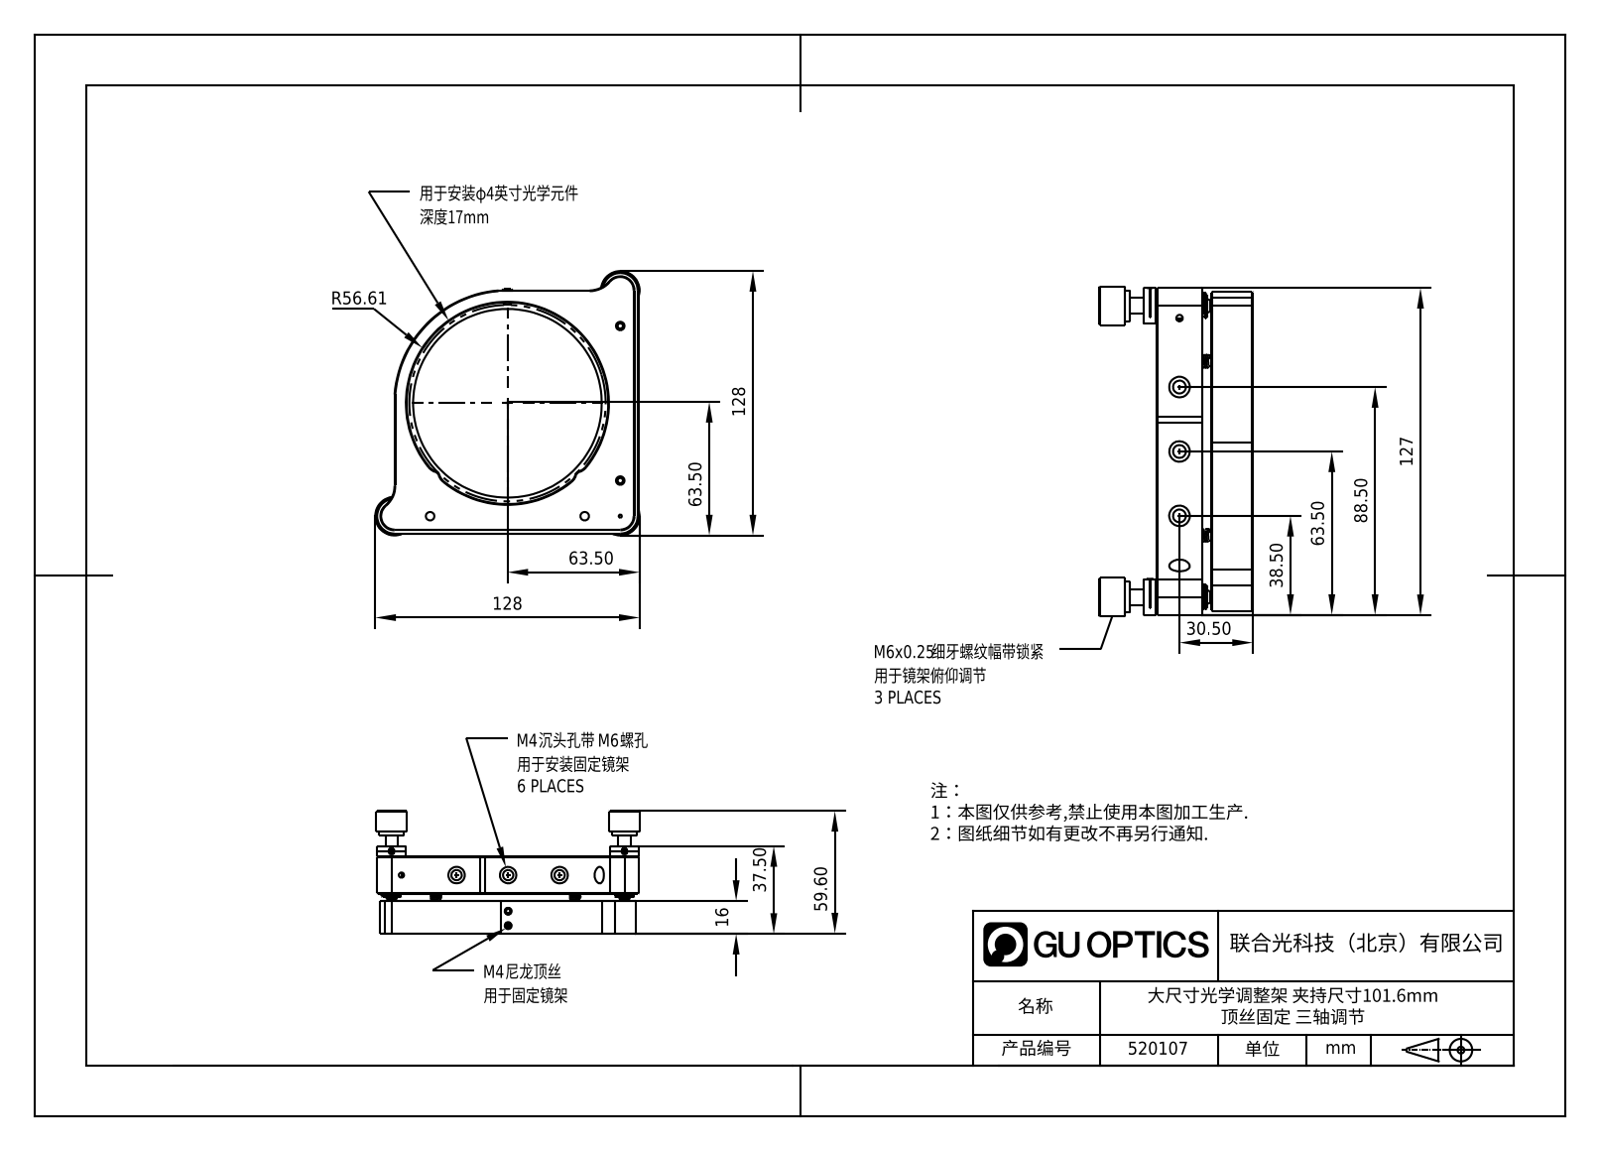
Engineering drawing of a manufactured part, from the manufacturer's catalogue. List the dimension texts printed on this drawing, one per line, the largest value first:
128
128
127
88.50
63.50
63.50
63.50
59.60
38.50
37.50
30.50
16
